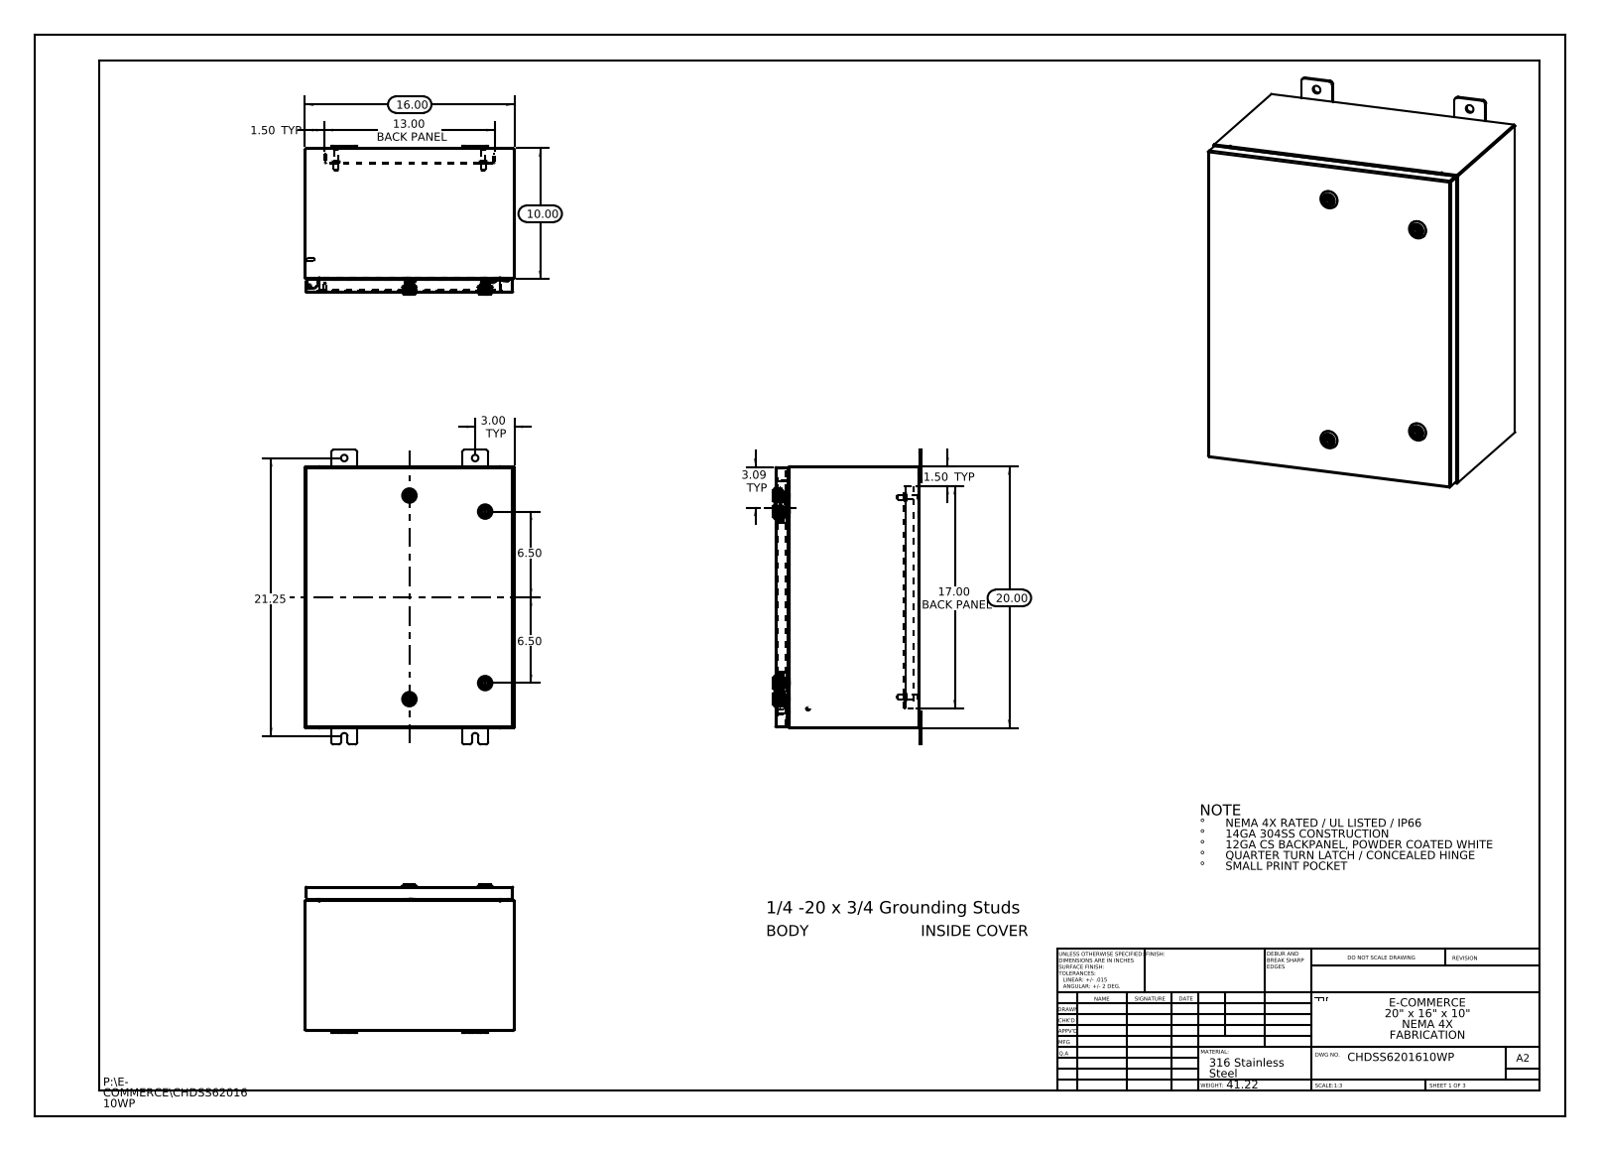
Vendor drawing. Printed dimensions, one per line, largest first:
21.25
20.00
17.00 BACK PANEL
16.00
13.00 BACK PANEL
10.00
6.50
6.50
3.09 TYP
3.00 TYP
1.50 TYP
1.50 TYP
